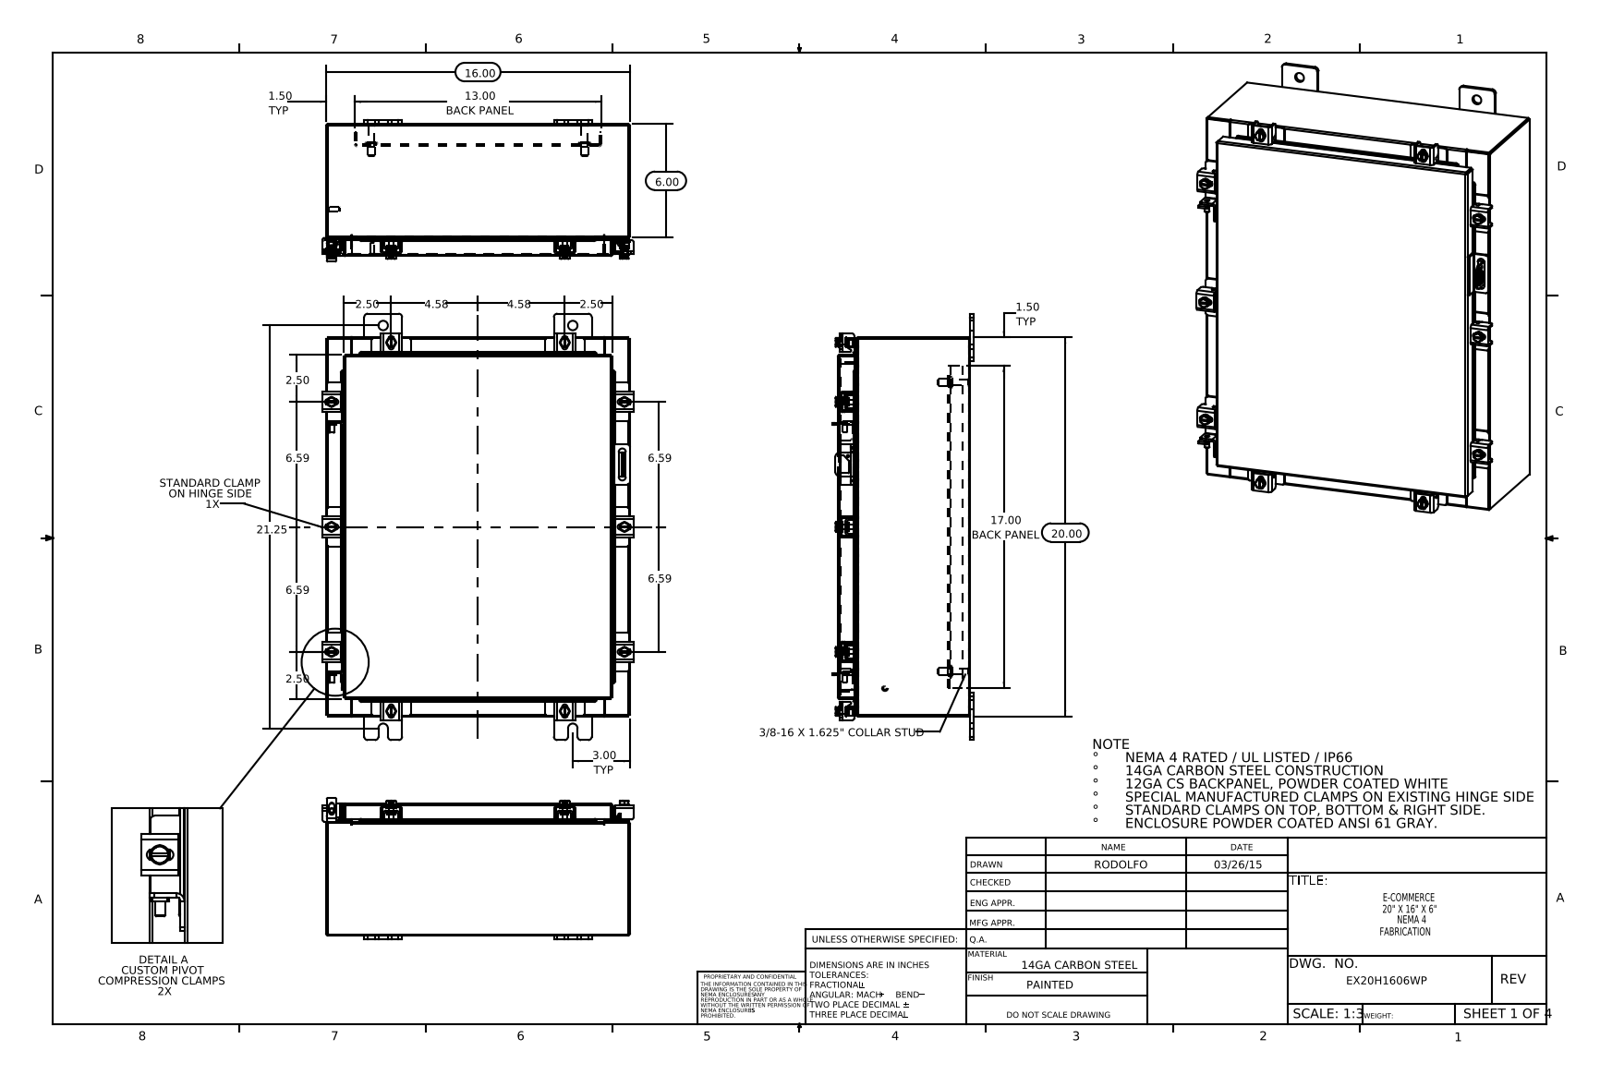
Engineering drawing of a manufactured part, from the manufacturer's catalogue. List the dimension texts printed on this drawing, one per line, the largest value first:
21.25
20.00
17.00 BACK PANEL
16.00
13.00 BACK PANEL
6.59
6.59
6.59
6.59
6.00
4.58
4.58
3.00 TYP
2.50
2.50
2.50
2.50
1.50 TYP
1.50 TYP
